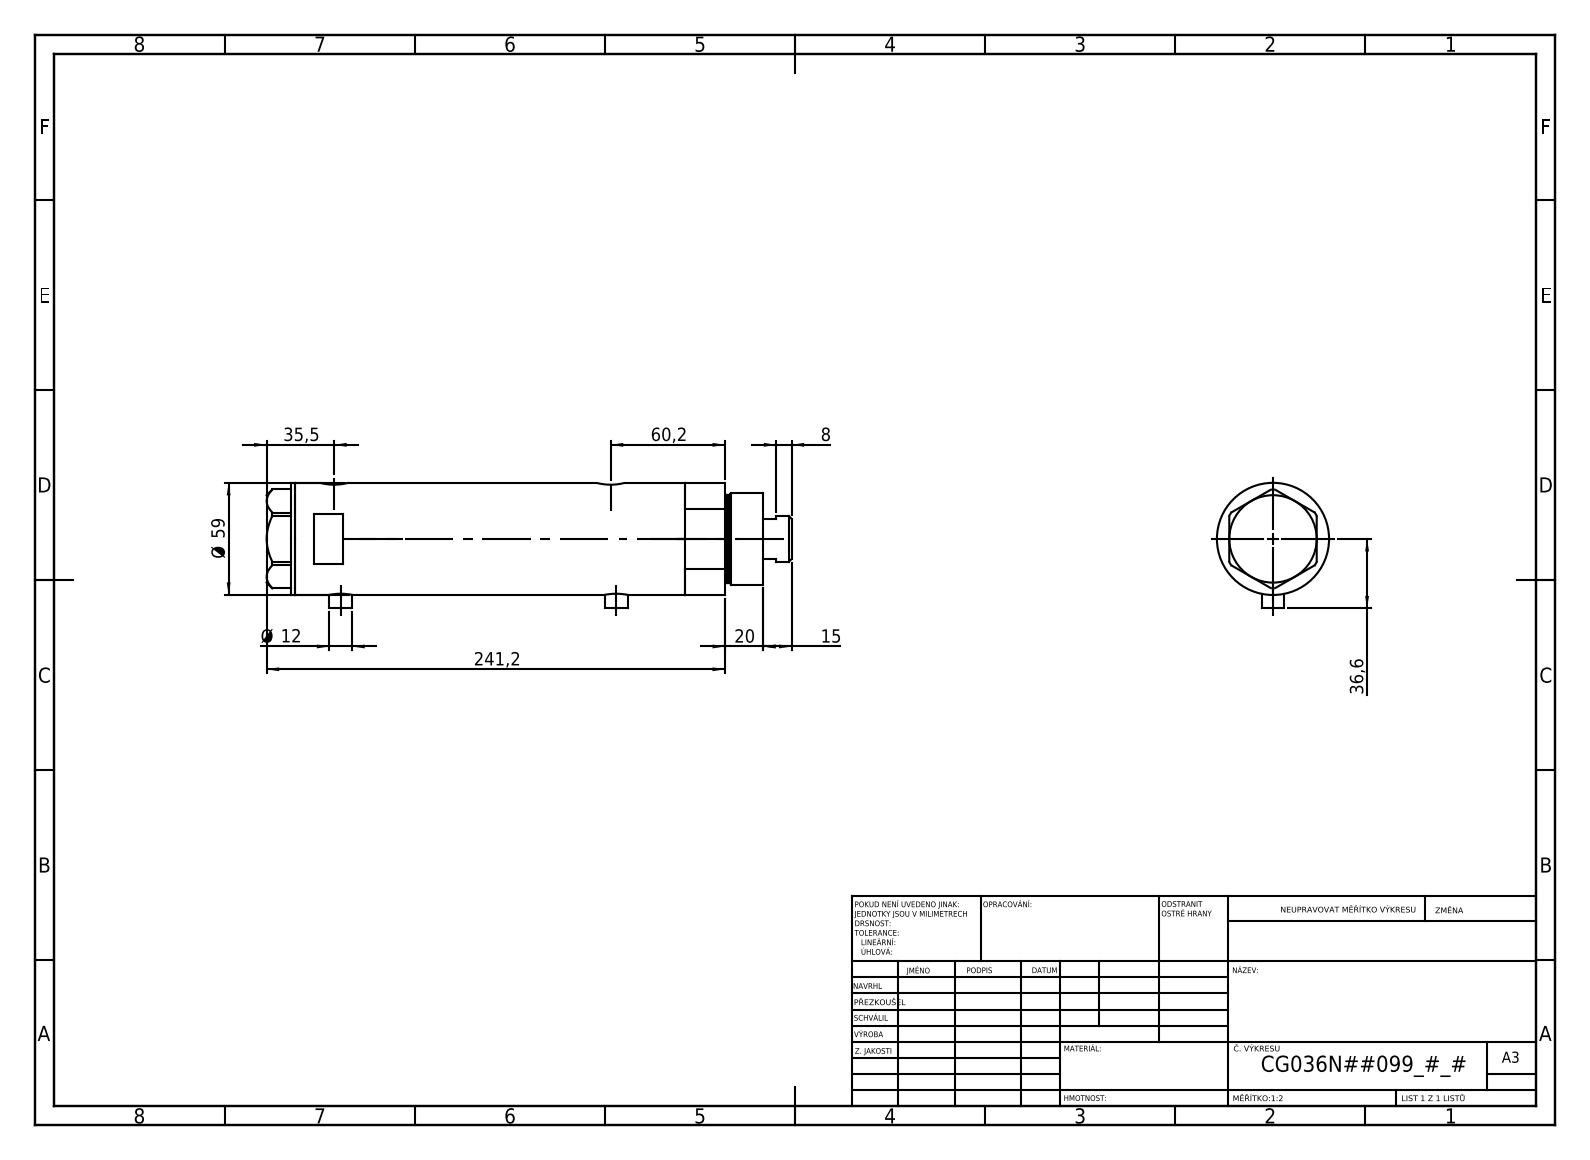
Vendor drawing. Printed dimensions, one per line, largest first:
241,2
60,2
Ø 59
36,6
35,5
20
15
Ø 12
8
